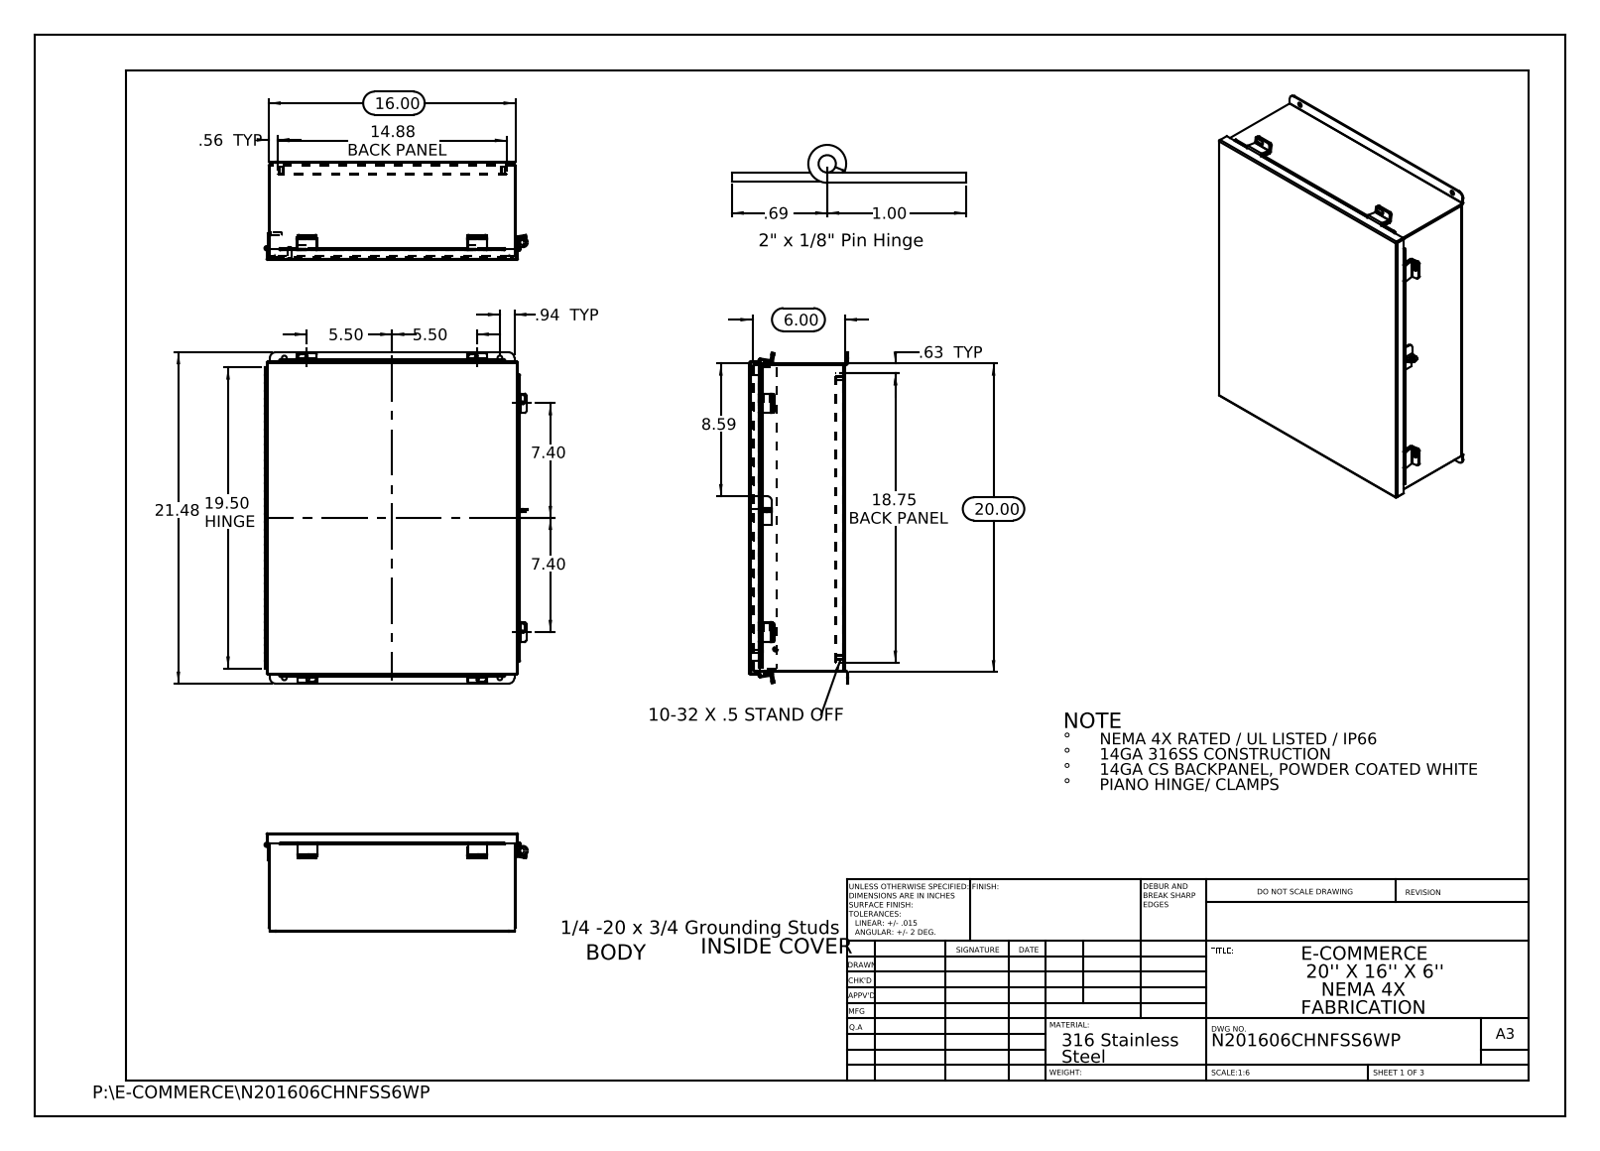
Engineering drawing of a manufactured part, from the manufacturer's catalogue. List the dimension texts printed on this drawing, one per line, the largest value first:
21.48
20.00
19.50 HINGE
18.75 BACK PANEL
16.00
14.88 BACK PANEL
8.59
7.40
7.40
6.00
5.50
5.50
1.00
.94 TYP
.69
.63 TYP
.56 TYP
